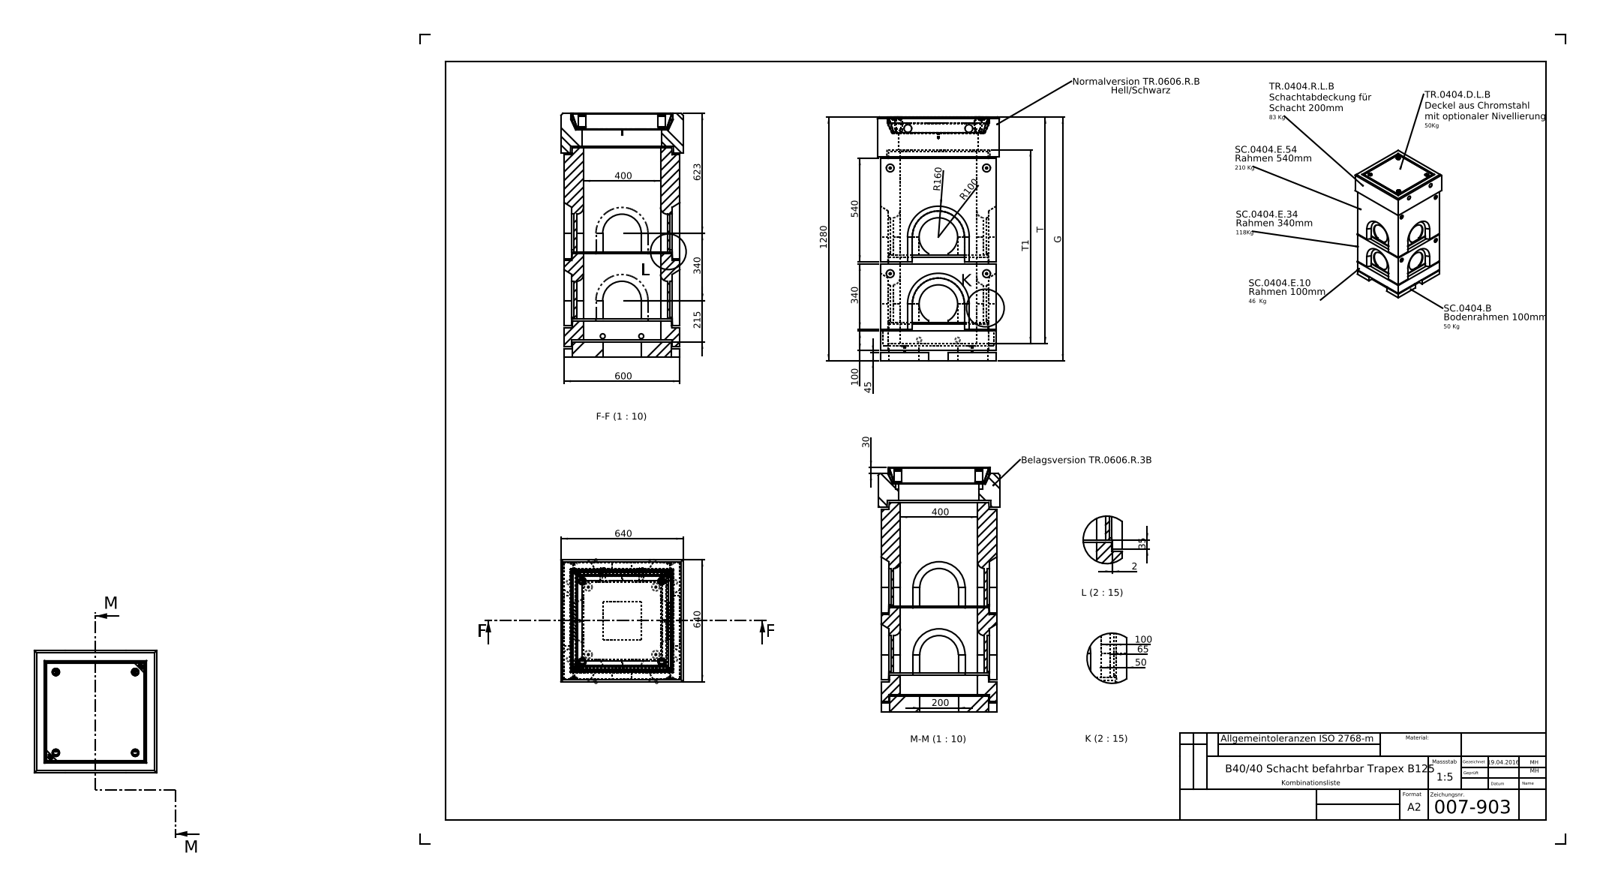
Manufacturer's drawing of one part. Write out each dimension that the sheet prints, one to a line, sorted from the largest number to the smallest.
1280
640
640
623
600
540
400
400
340
340
215
200
R160
100
R100
100
65
50
45
35
30
2
T1
T
G
